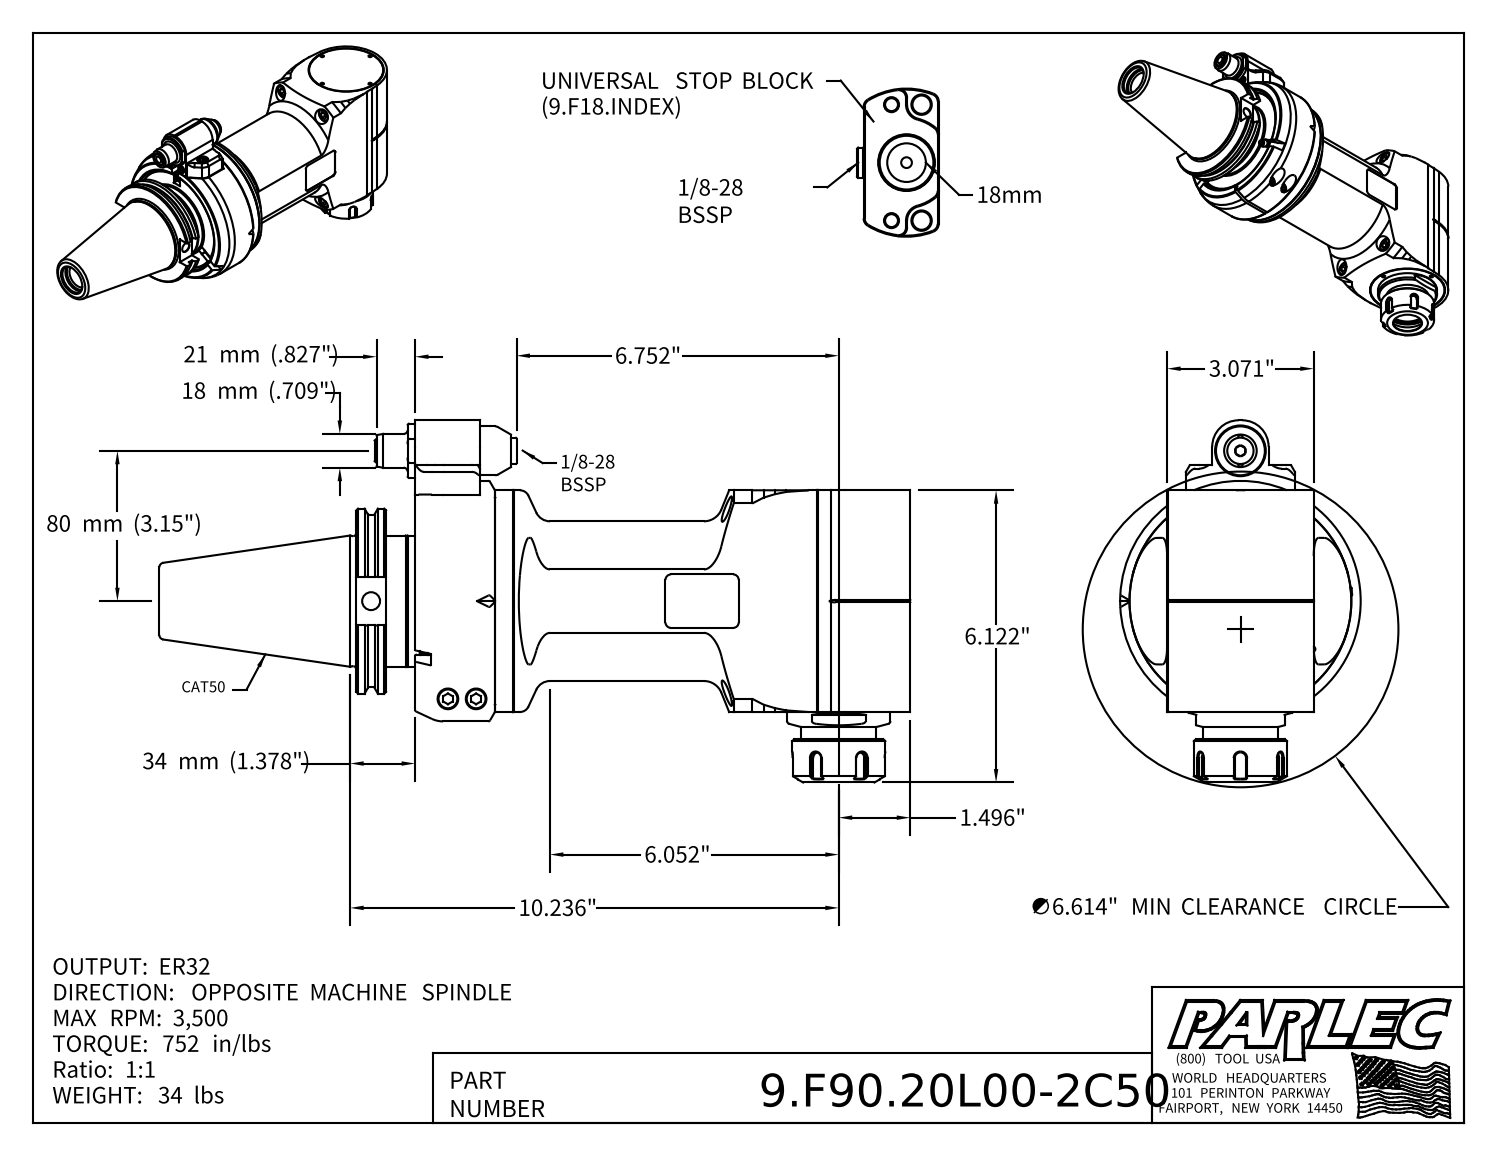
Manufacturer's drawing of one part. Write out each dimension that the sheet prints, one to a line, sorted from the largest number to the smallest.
80 mm (3.15")
34 mm (1.378")
21 mm (.827")
18 mm (.709")
10.236"
6.752"
∅6.614" MIN CLEARANCE CIRCLE
6.122"
6.052"
3.071"
1.496"
